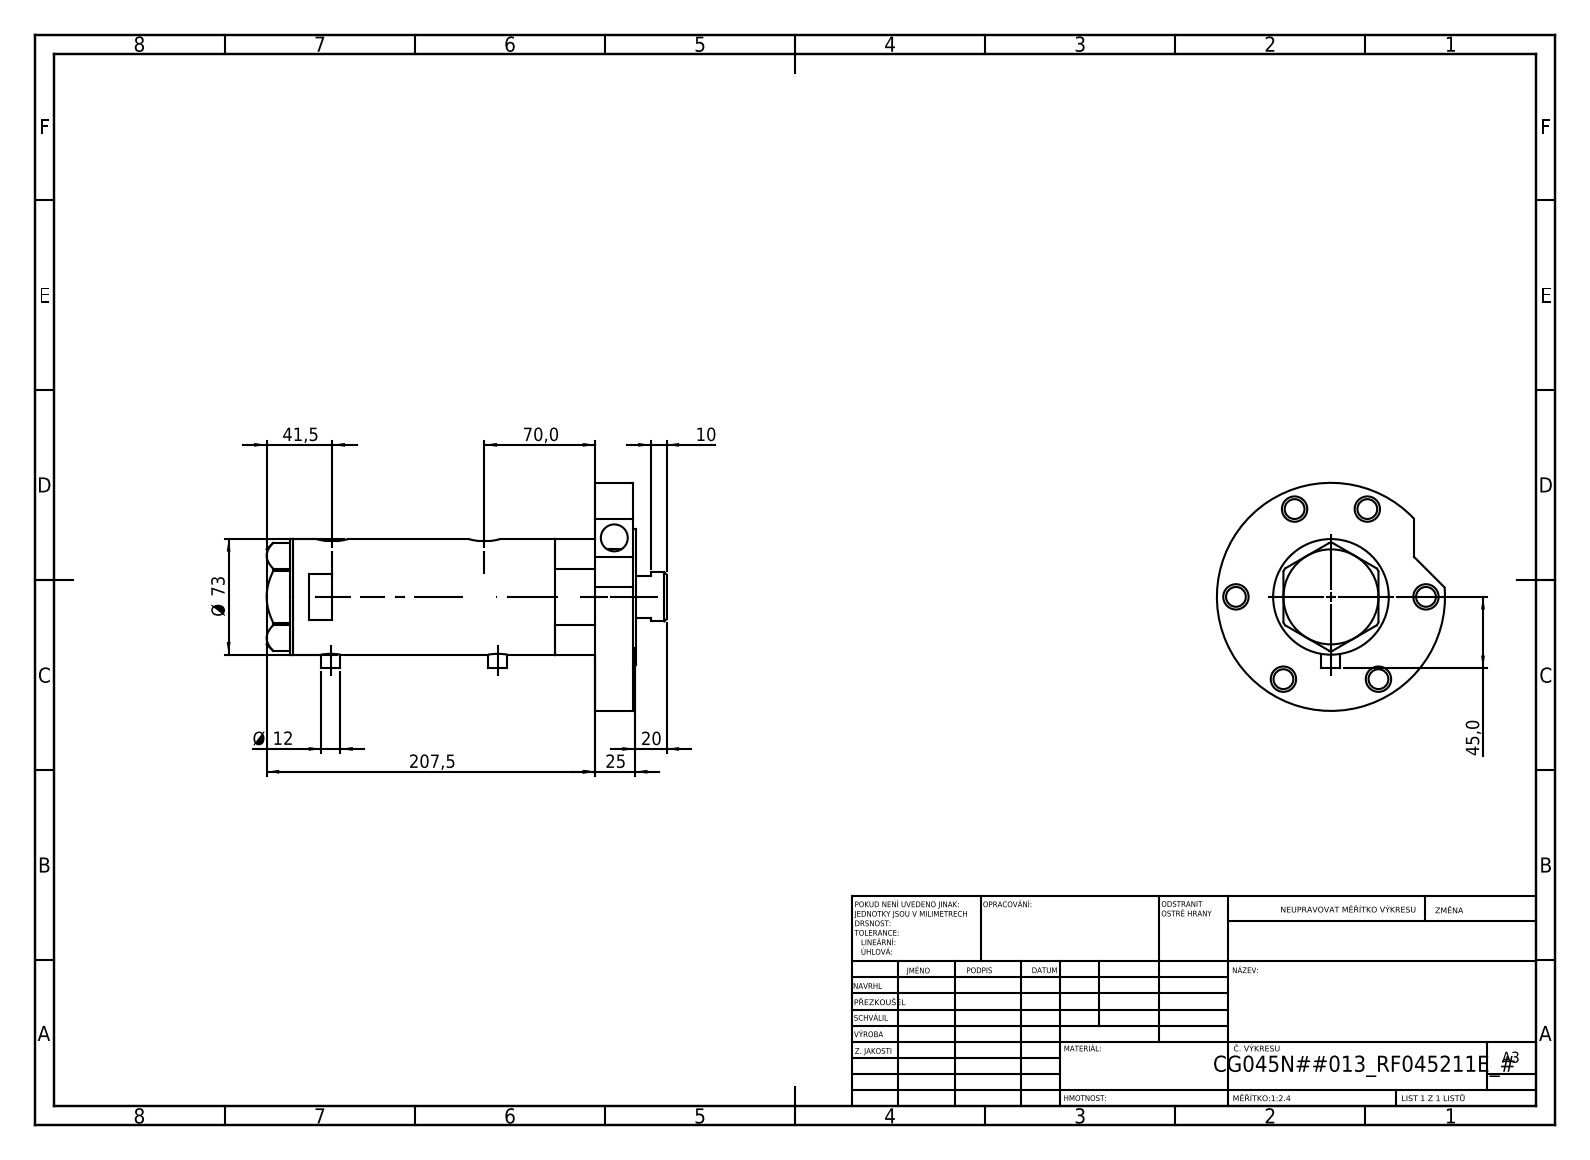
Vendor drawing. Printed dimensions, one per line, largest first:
207,5
Ø 73
70,0
45,0
41,5
25
20
Ø 12
10
